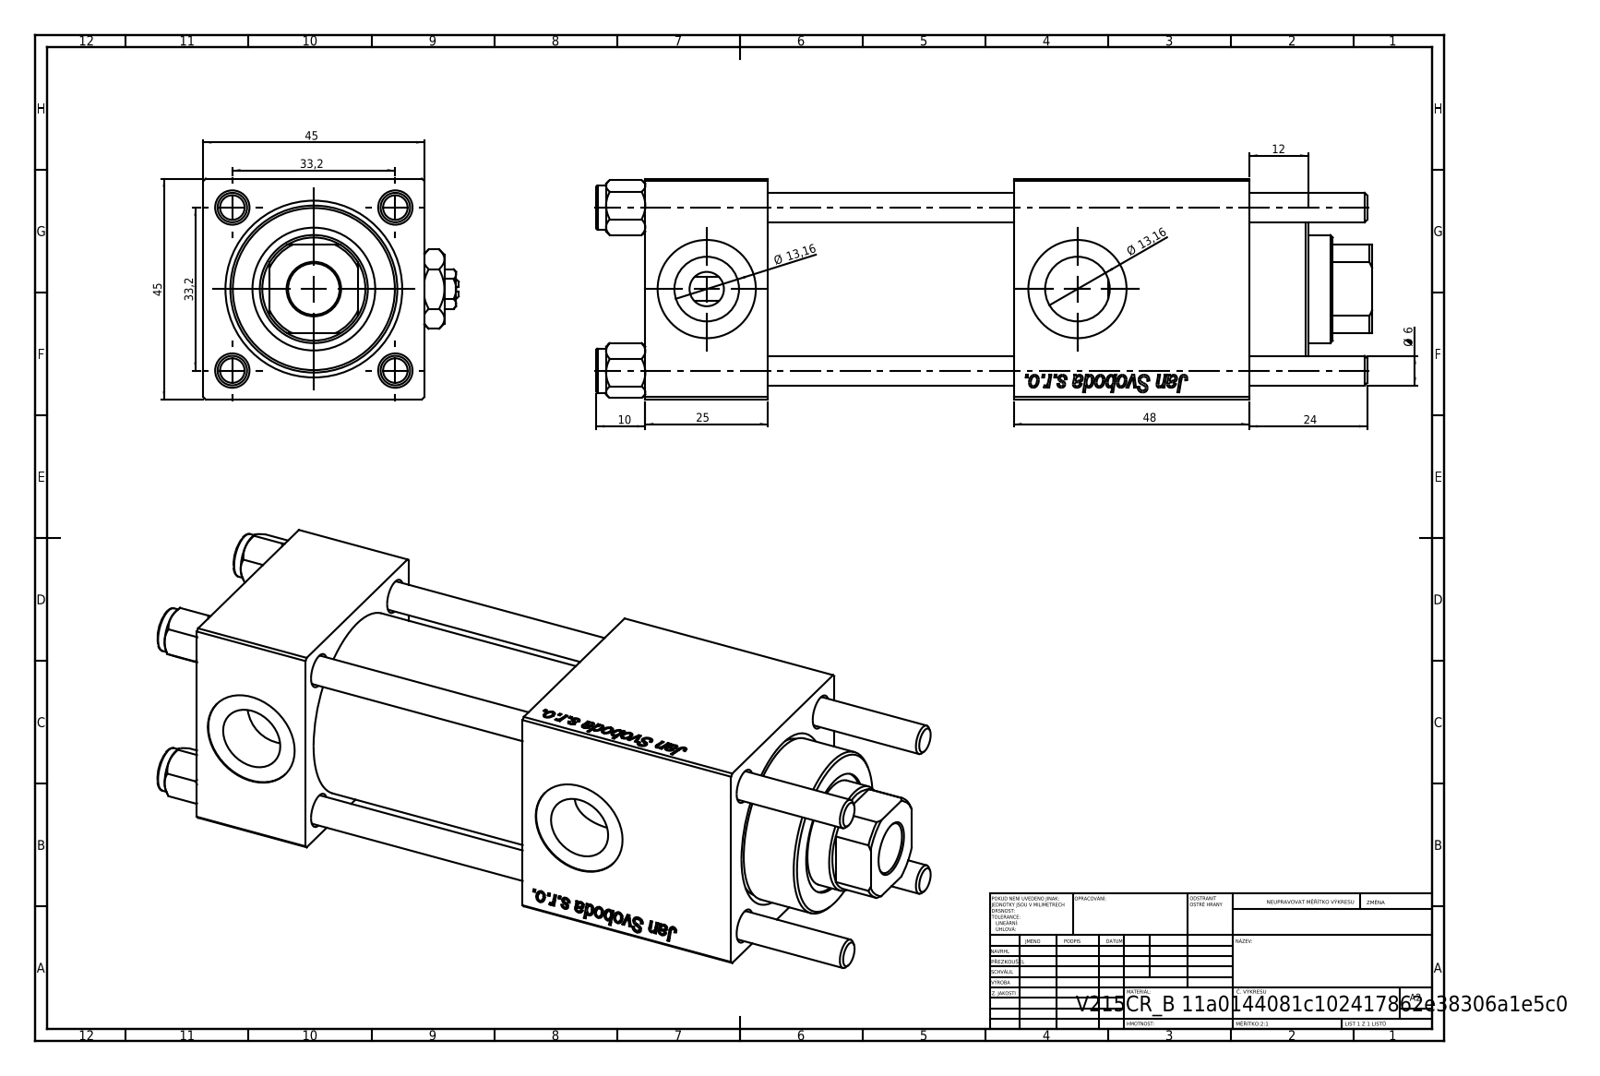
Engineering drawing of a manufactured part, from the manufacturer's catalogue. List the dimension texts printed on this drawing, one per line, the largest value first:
48
45
45
33,2
33,2
25
24
Ø 13,16
Ø 13,16
12
10
Ø 6
